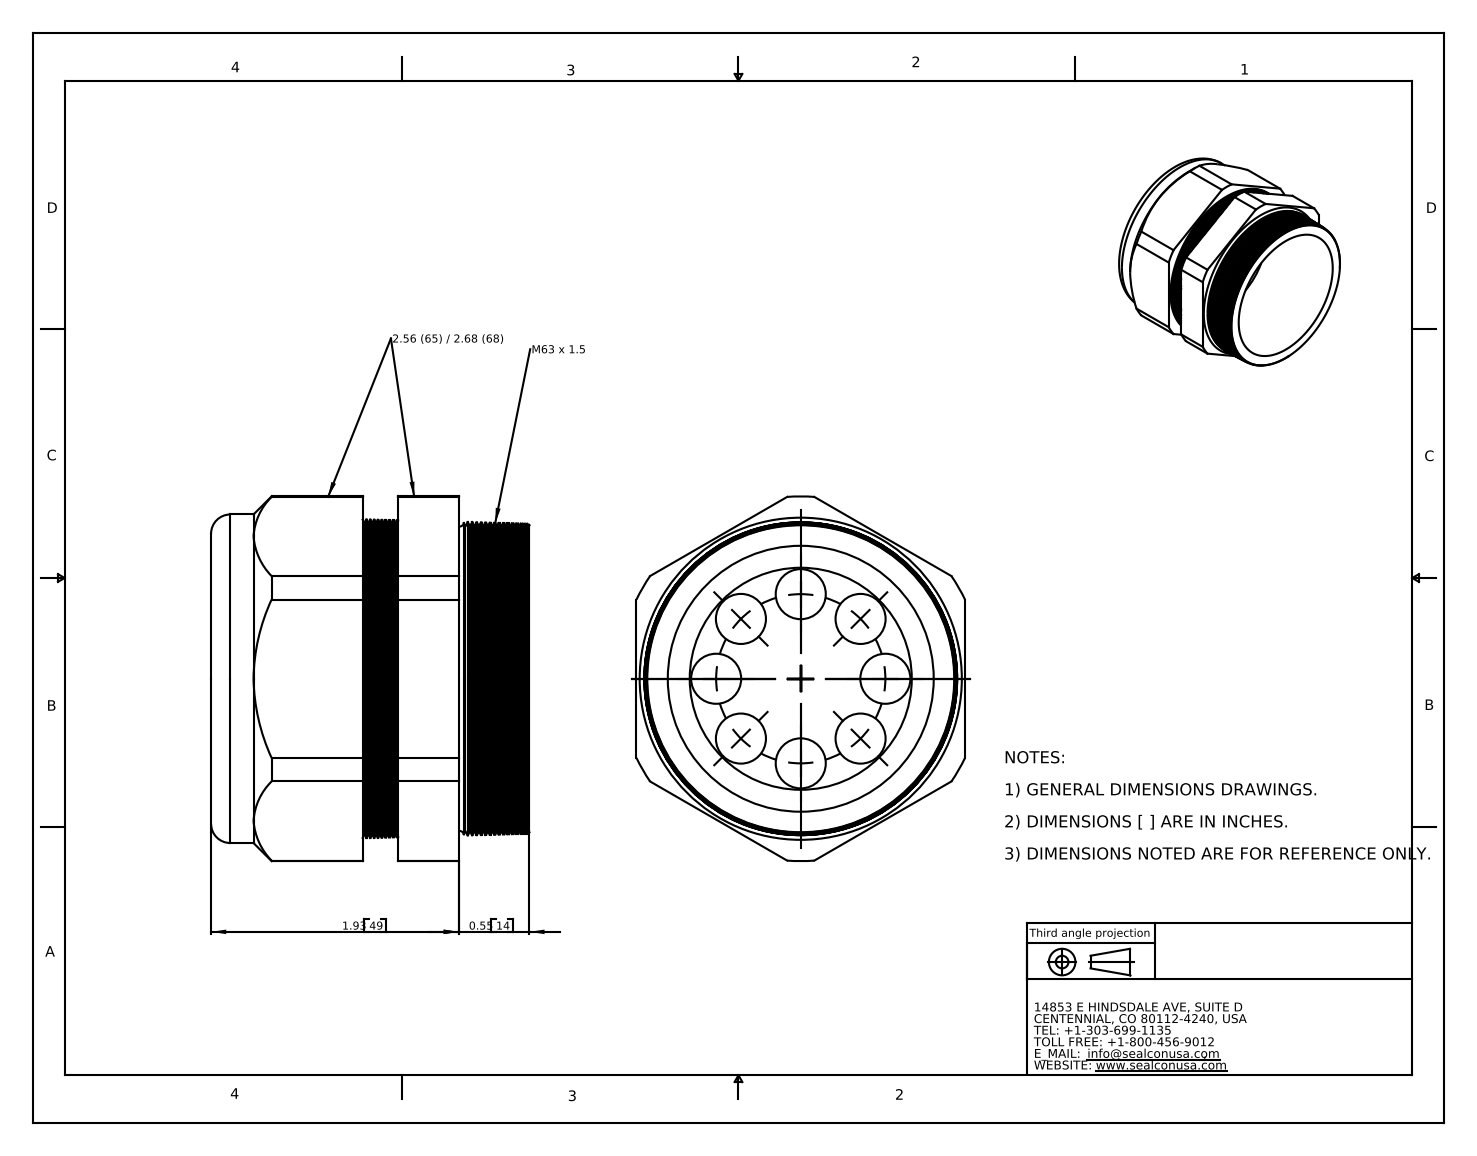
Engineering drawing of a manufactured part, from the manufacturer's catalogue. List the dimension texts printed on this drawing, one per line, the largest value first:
1.93 49
0.55 14
